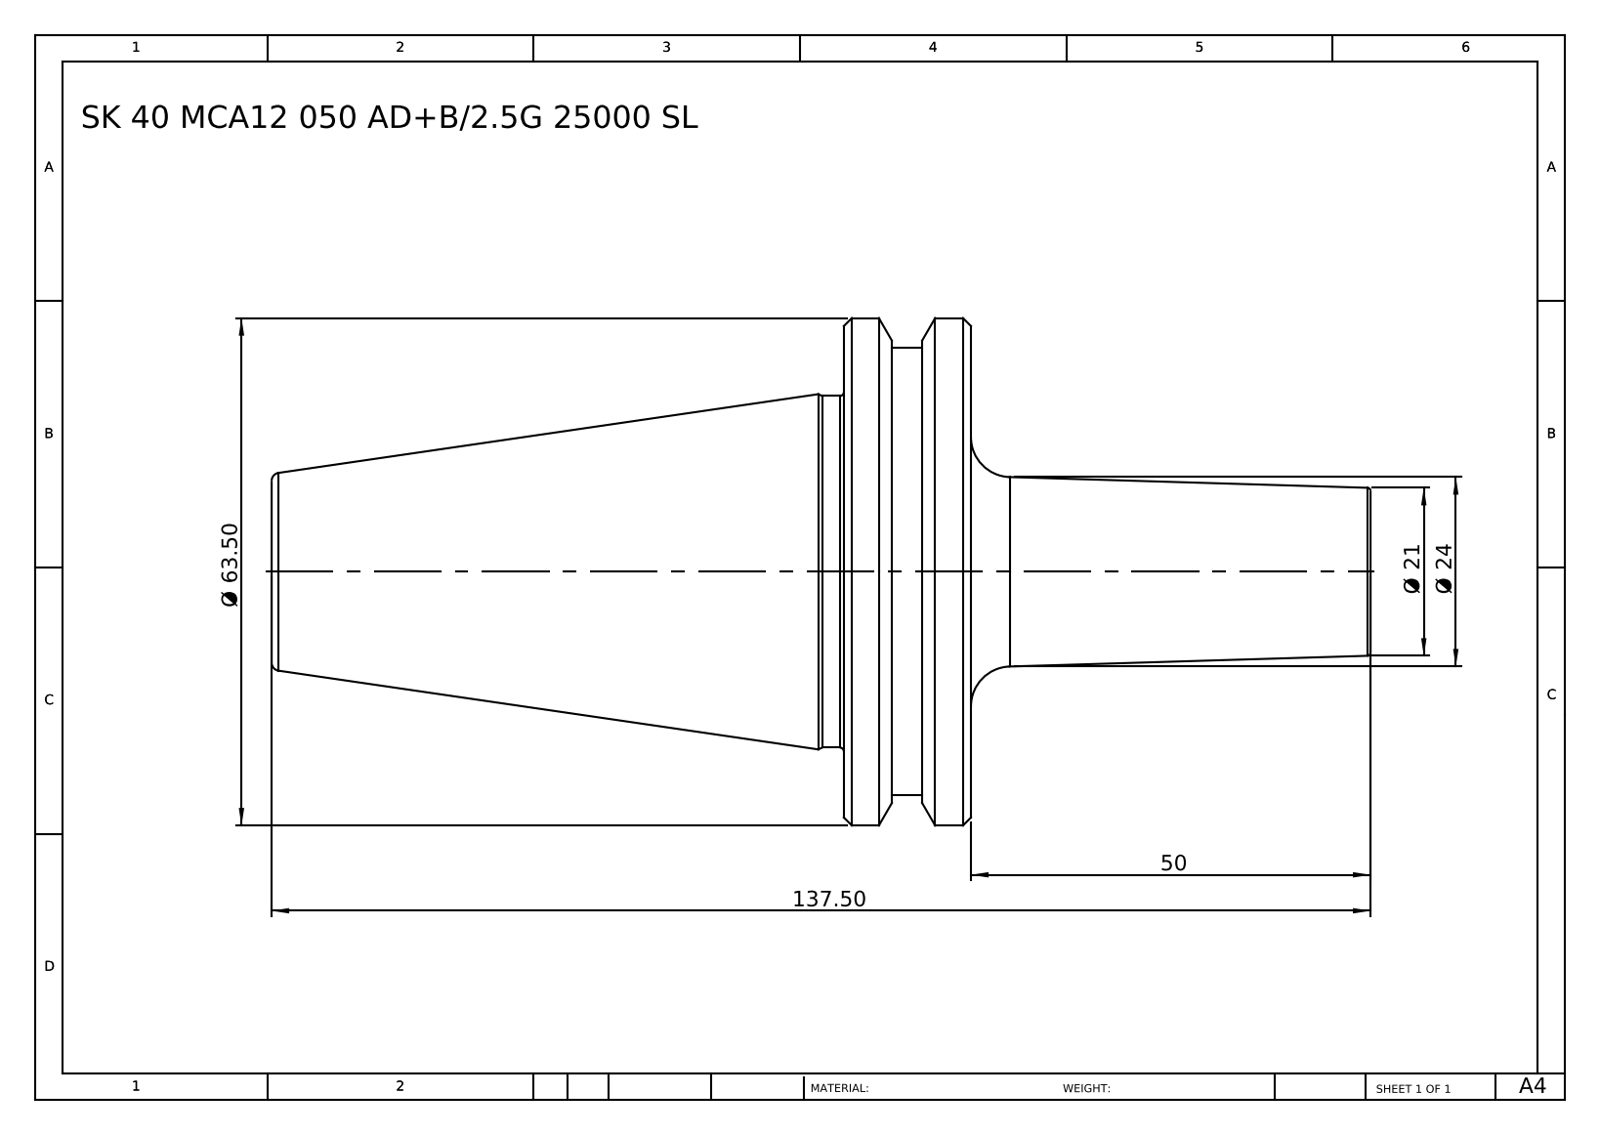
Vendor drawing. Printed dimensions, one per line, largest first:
137.50
Ø 63.50
50
Ø 24
Ø 21
